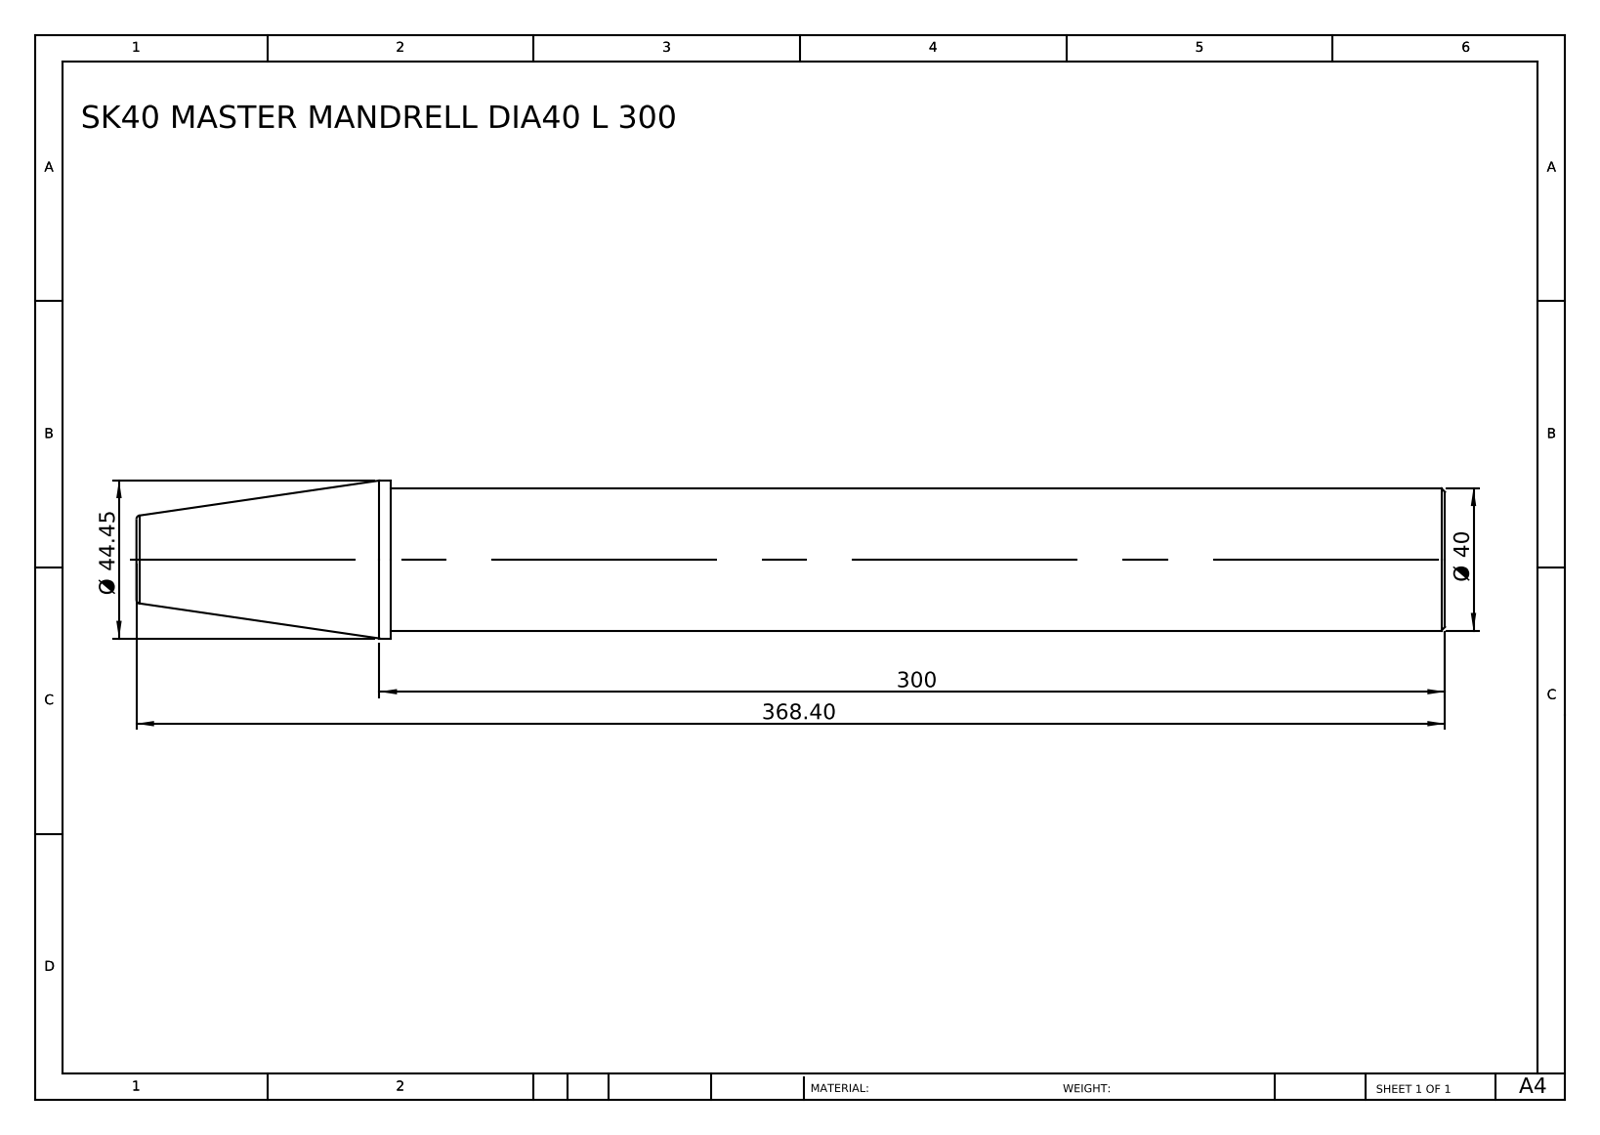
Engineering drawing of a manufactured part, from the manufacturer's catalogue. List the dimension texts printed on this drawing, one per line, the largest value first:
368.40
300
Ø 44.45
Ø 40
